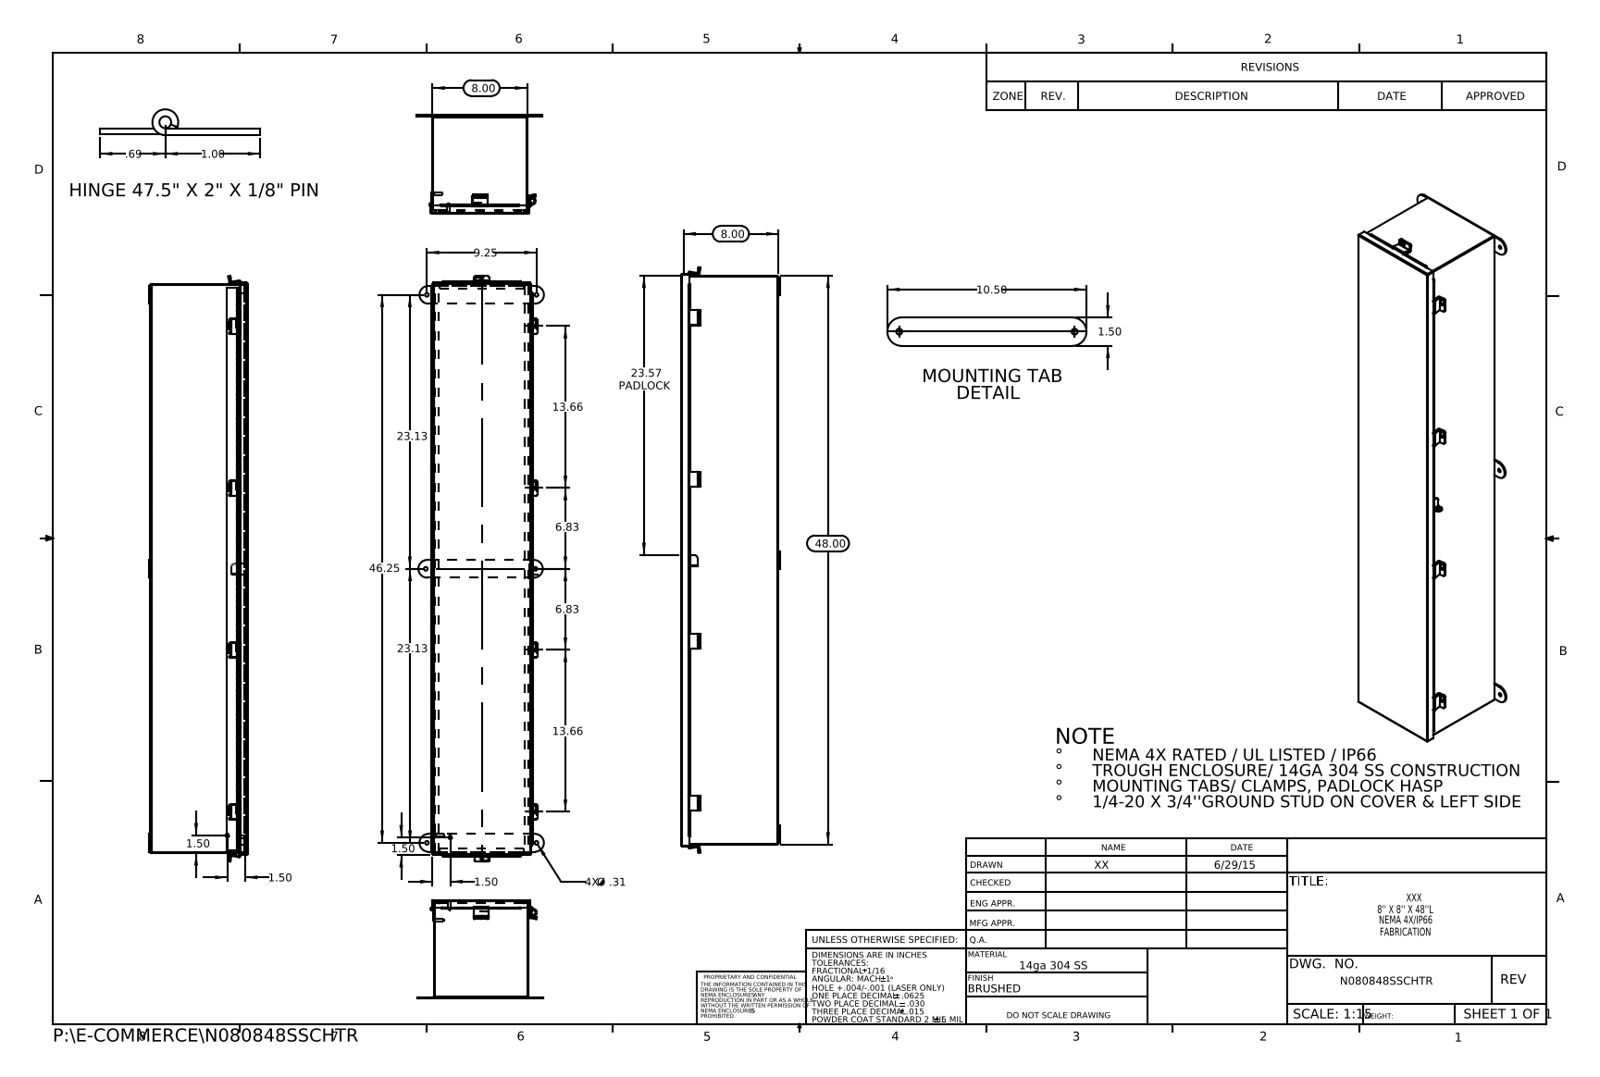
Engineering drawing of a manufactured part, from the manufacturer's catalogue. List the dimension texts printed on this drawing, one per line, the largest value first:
48.00
46.25
23.57 PADLOCK
23.13
23.13
13.66
13.66
10.50
9.25
8.00
8.00
6.83
6.83
1.50
1.50
1.50
1.50
1.50
1.00
.69
4X Ø .31
